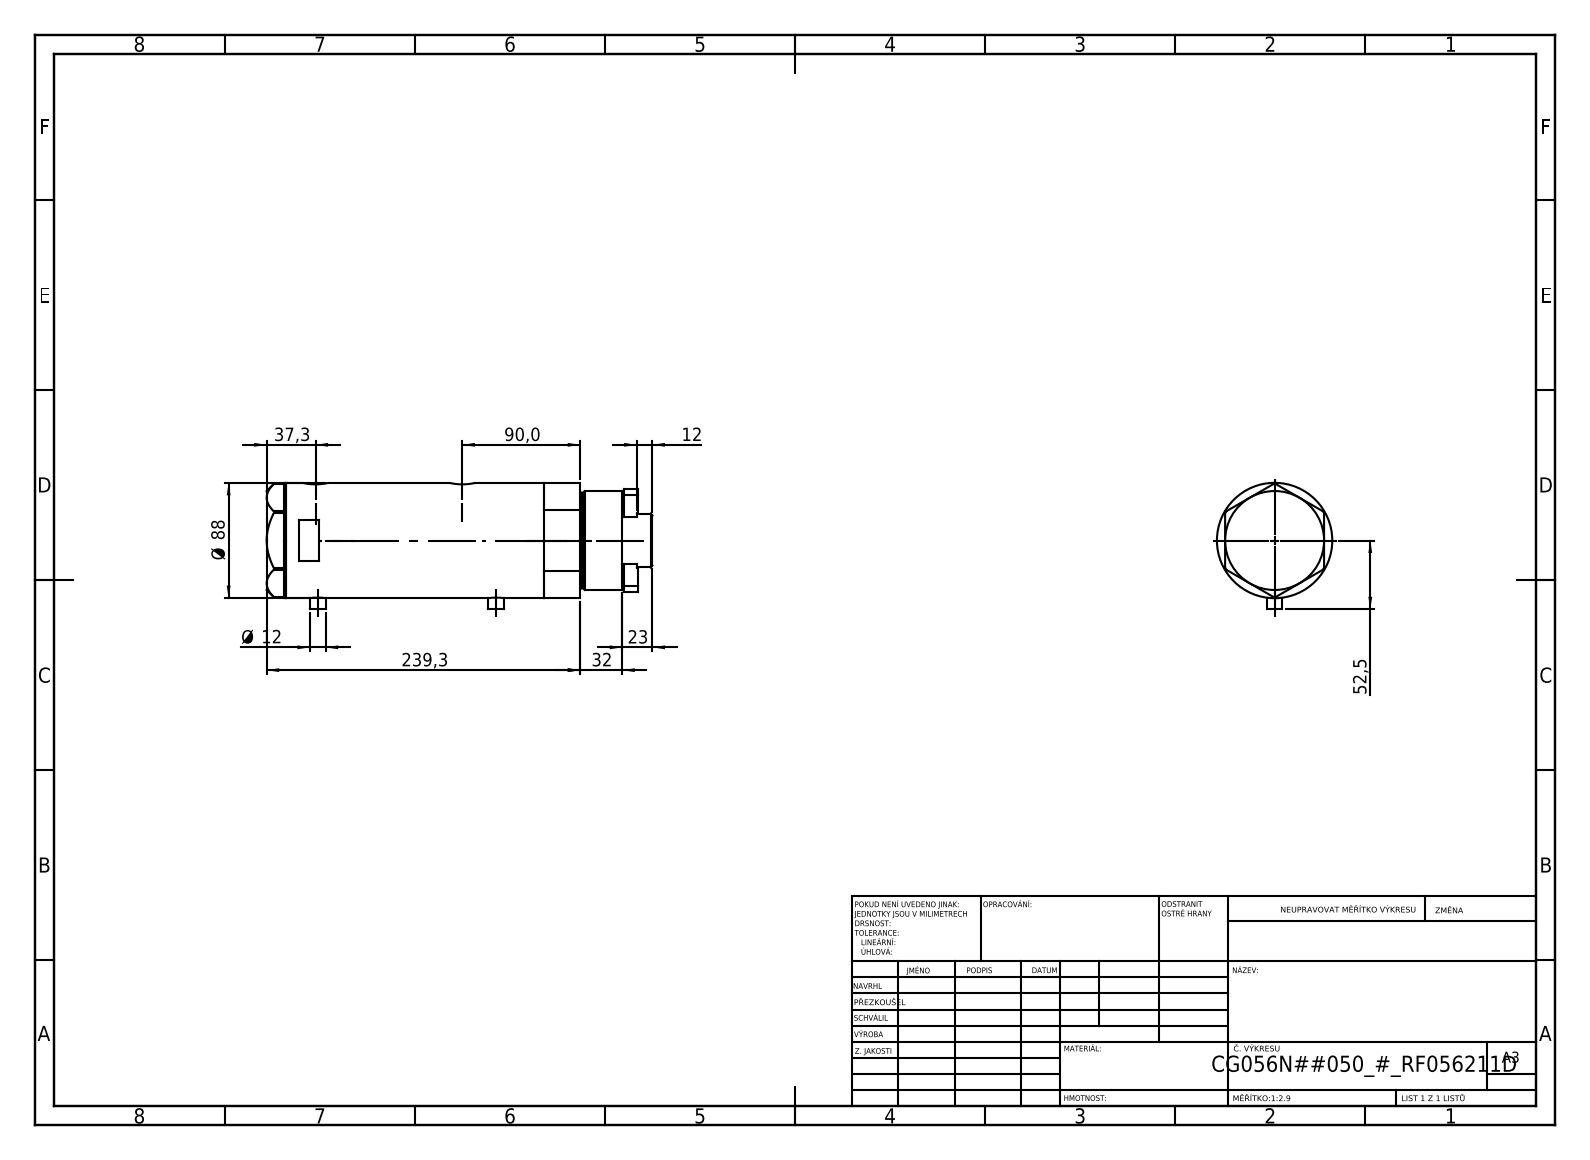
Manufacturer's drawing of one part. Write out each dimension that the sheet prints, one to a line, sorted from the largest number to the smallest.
239,3
90,0
Ø 88
52,5
37,3
32
23
12
Ø 12
